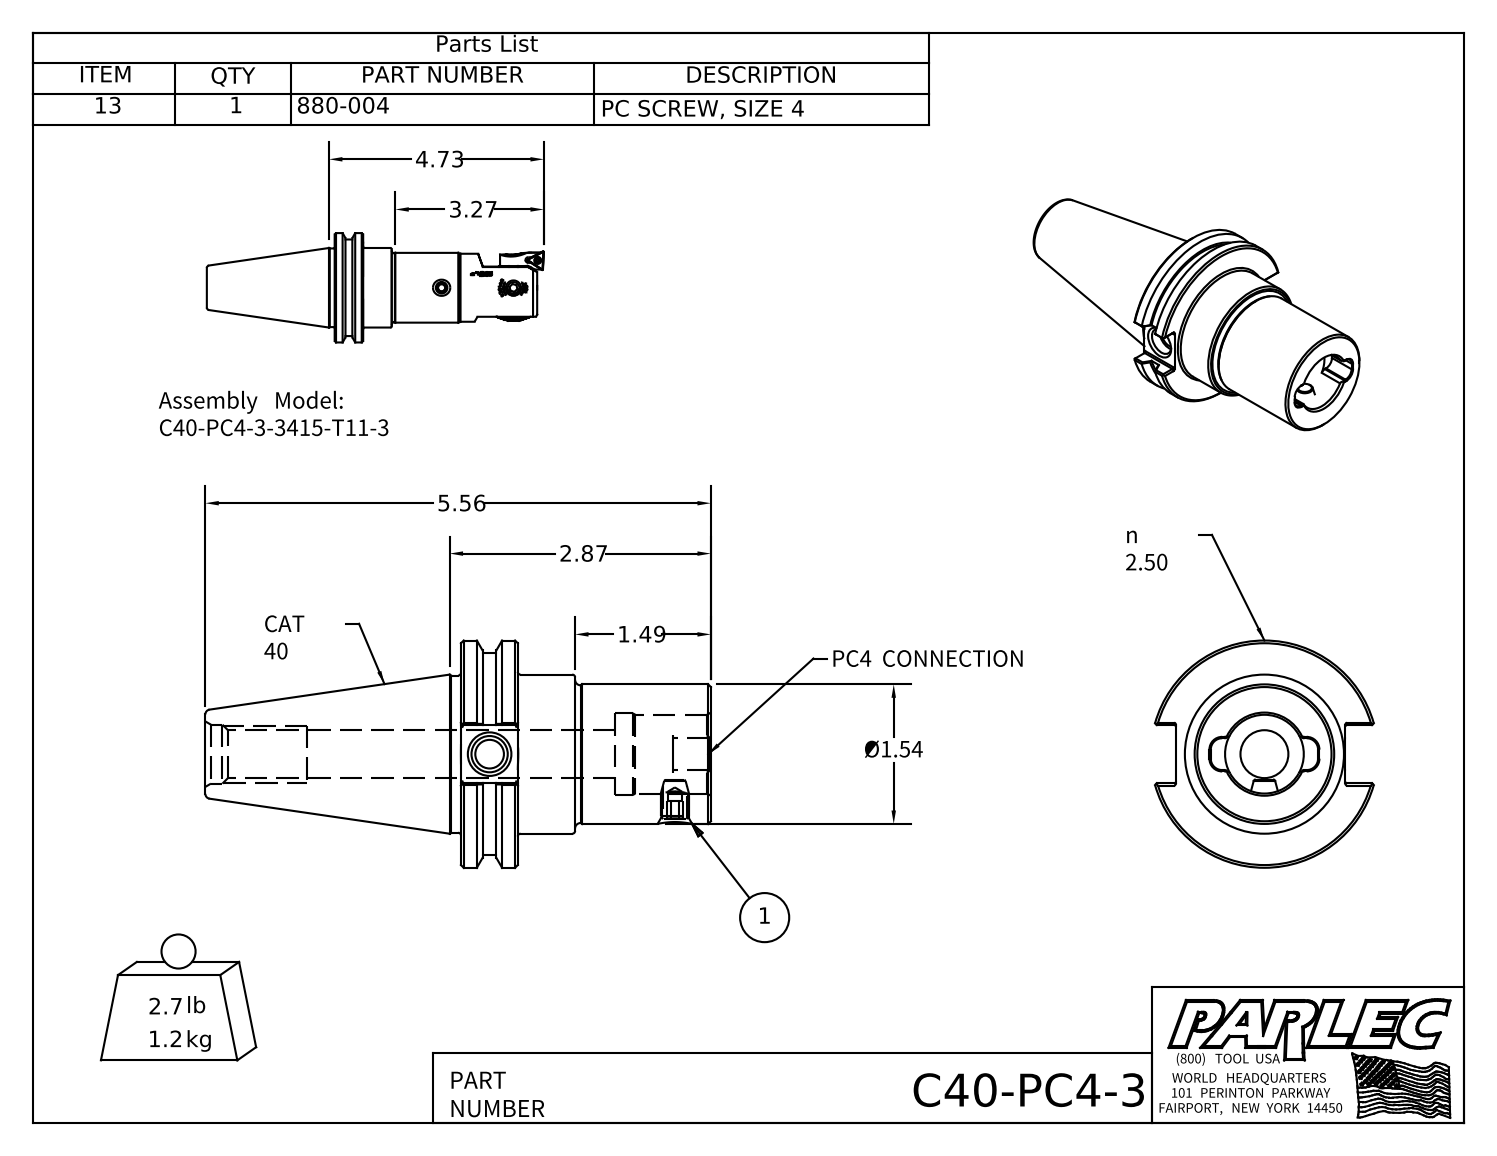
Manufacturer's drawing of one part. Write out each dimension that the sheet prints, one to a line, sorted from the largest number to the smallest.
5.56
4.73
3.27
2.87
Ø1.54
1.49
